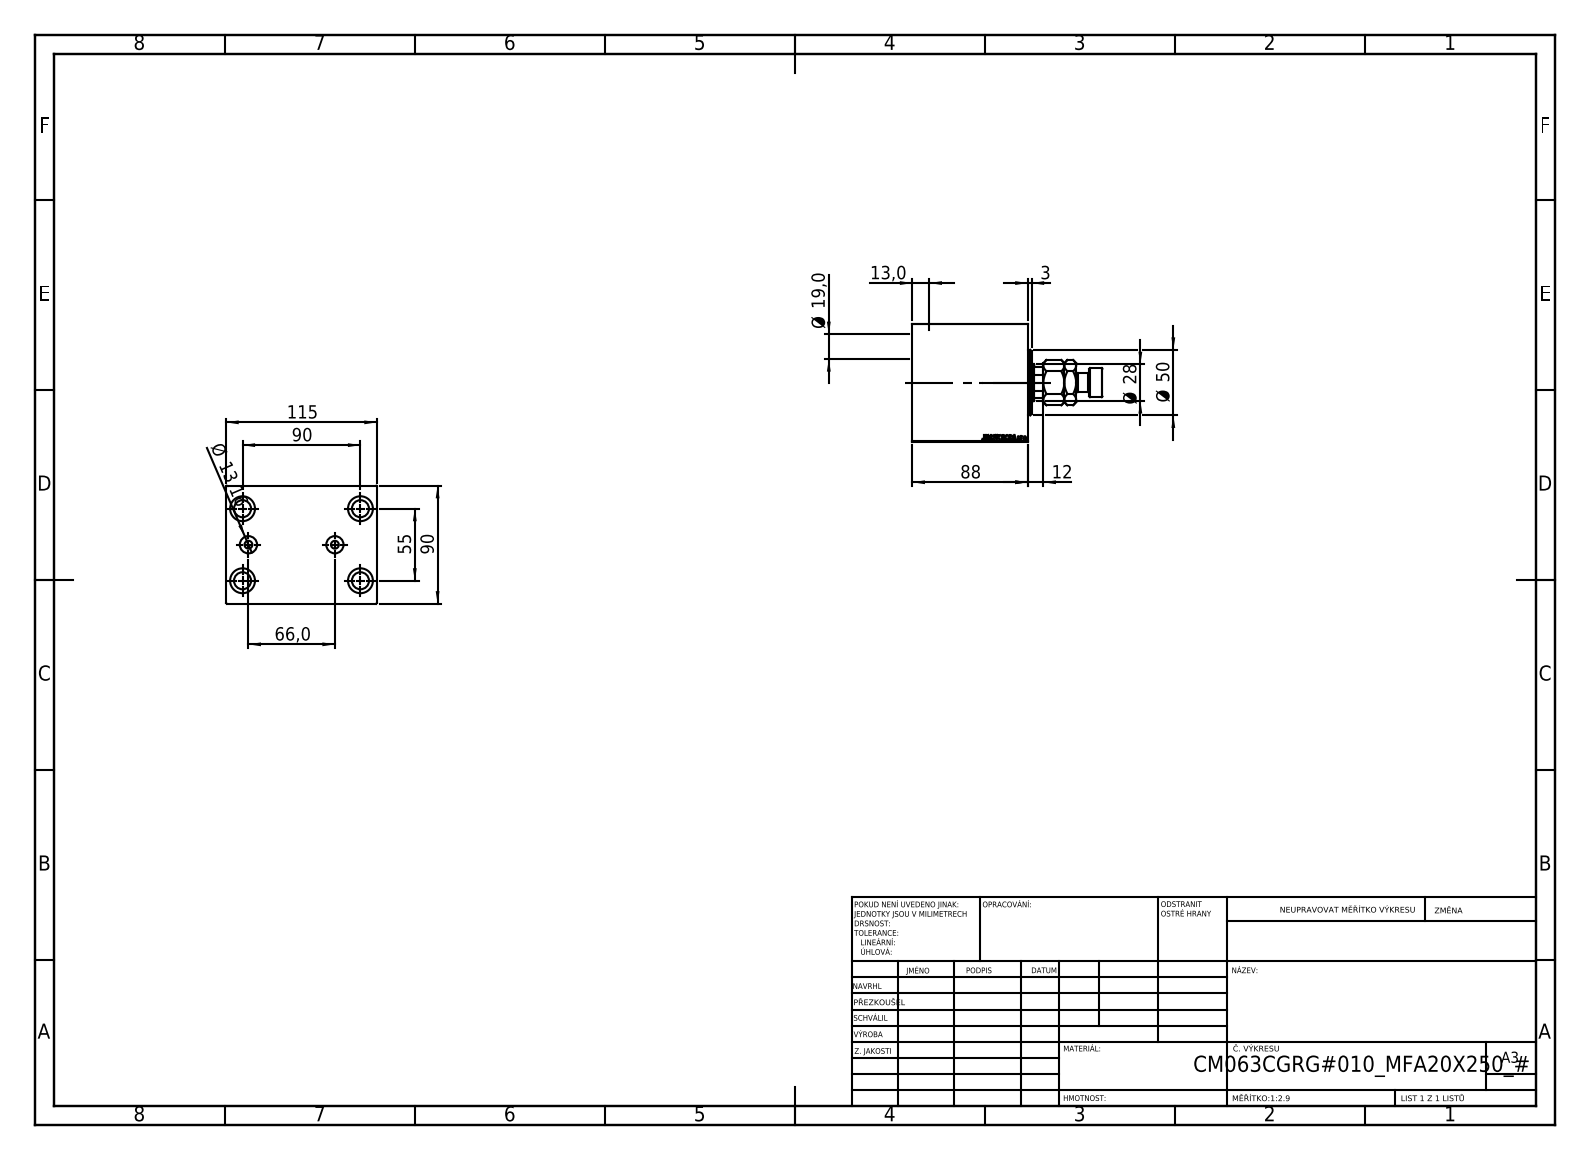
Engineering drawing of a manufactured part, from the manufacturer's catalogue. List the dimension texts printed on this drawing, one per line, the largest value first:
115
90
90
88
66,0
55
Ø 50
Ø 28
Ø 19,0
Ø 13,16
13,0
12
3
